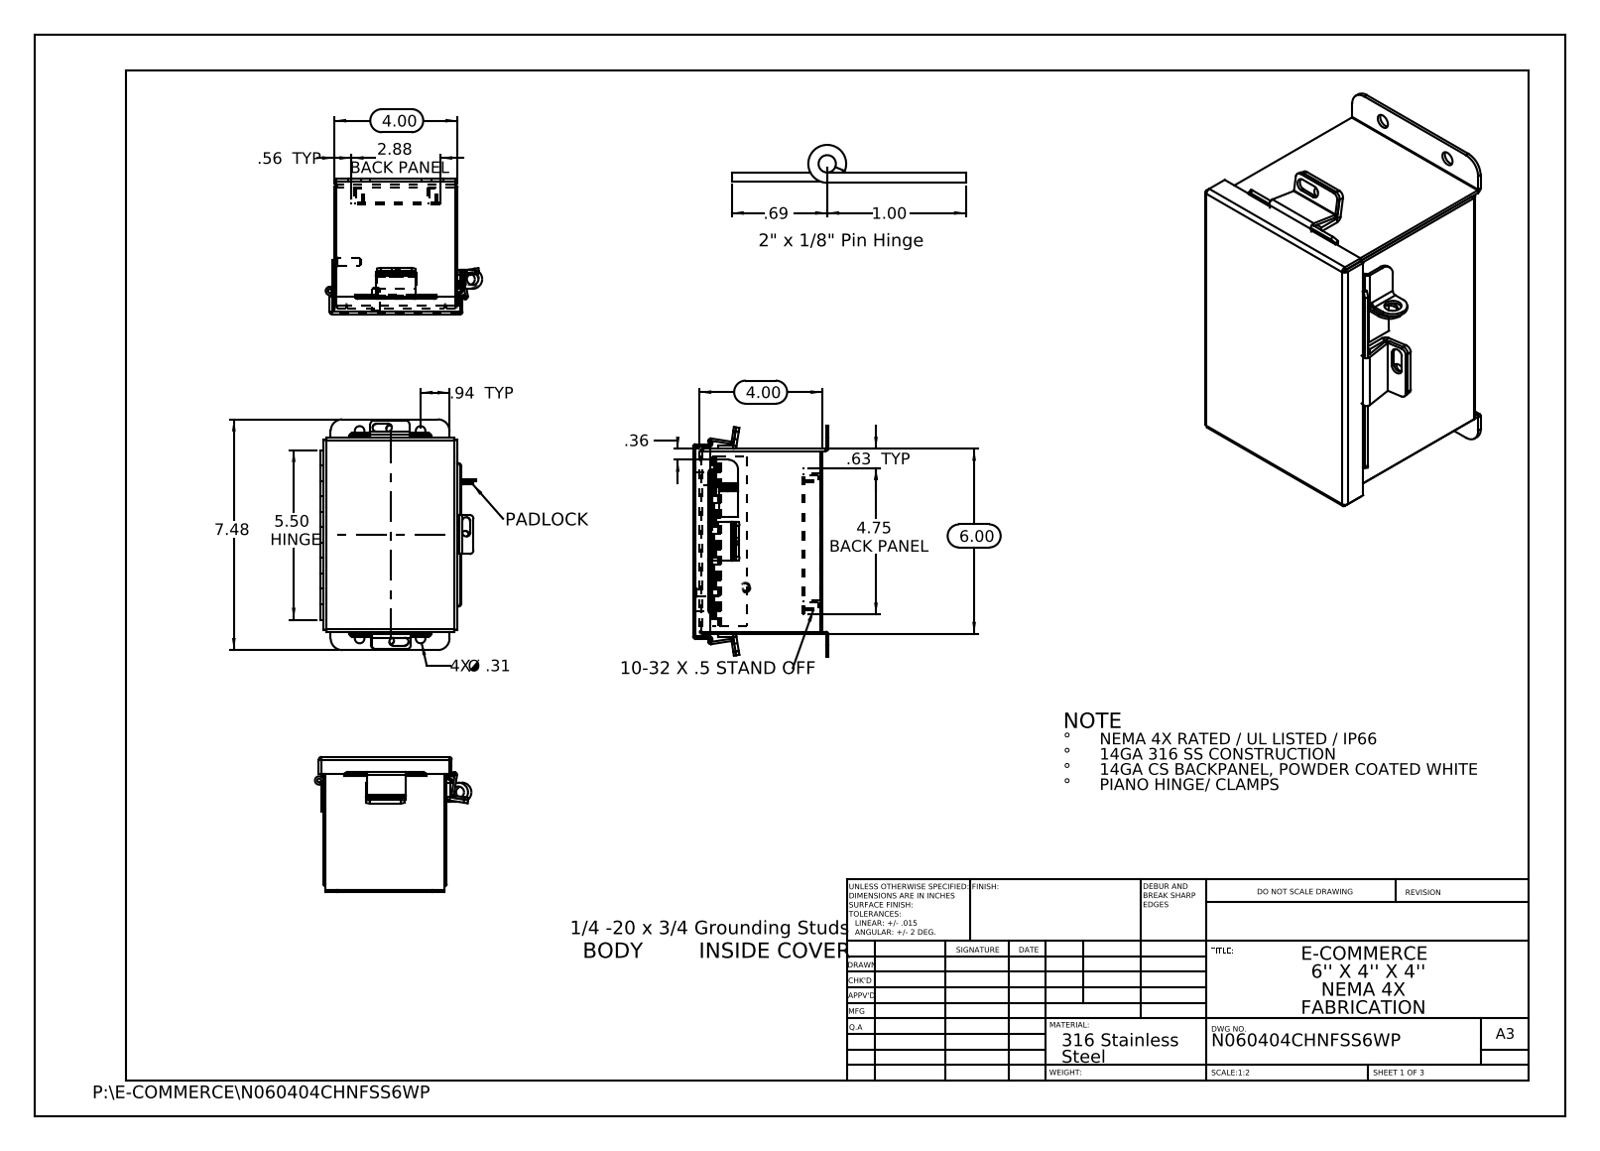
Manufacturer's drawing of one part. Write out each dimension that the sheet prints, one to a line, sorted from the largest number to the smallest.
7.48
6.00
5.50 HINGE
4.75 BACK PANEL
4.00
4.00
2.88 BACK PANEL
1.00
.94 TYP
.69
.63 TYP
.56 TYP
.36
4X Ø .31
